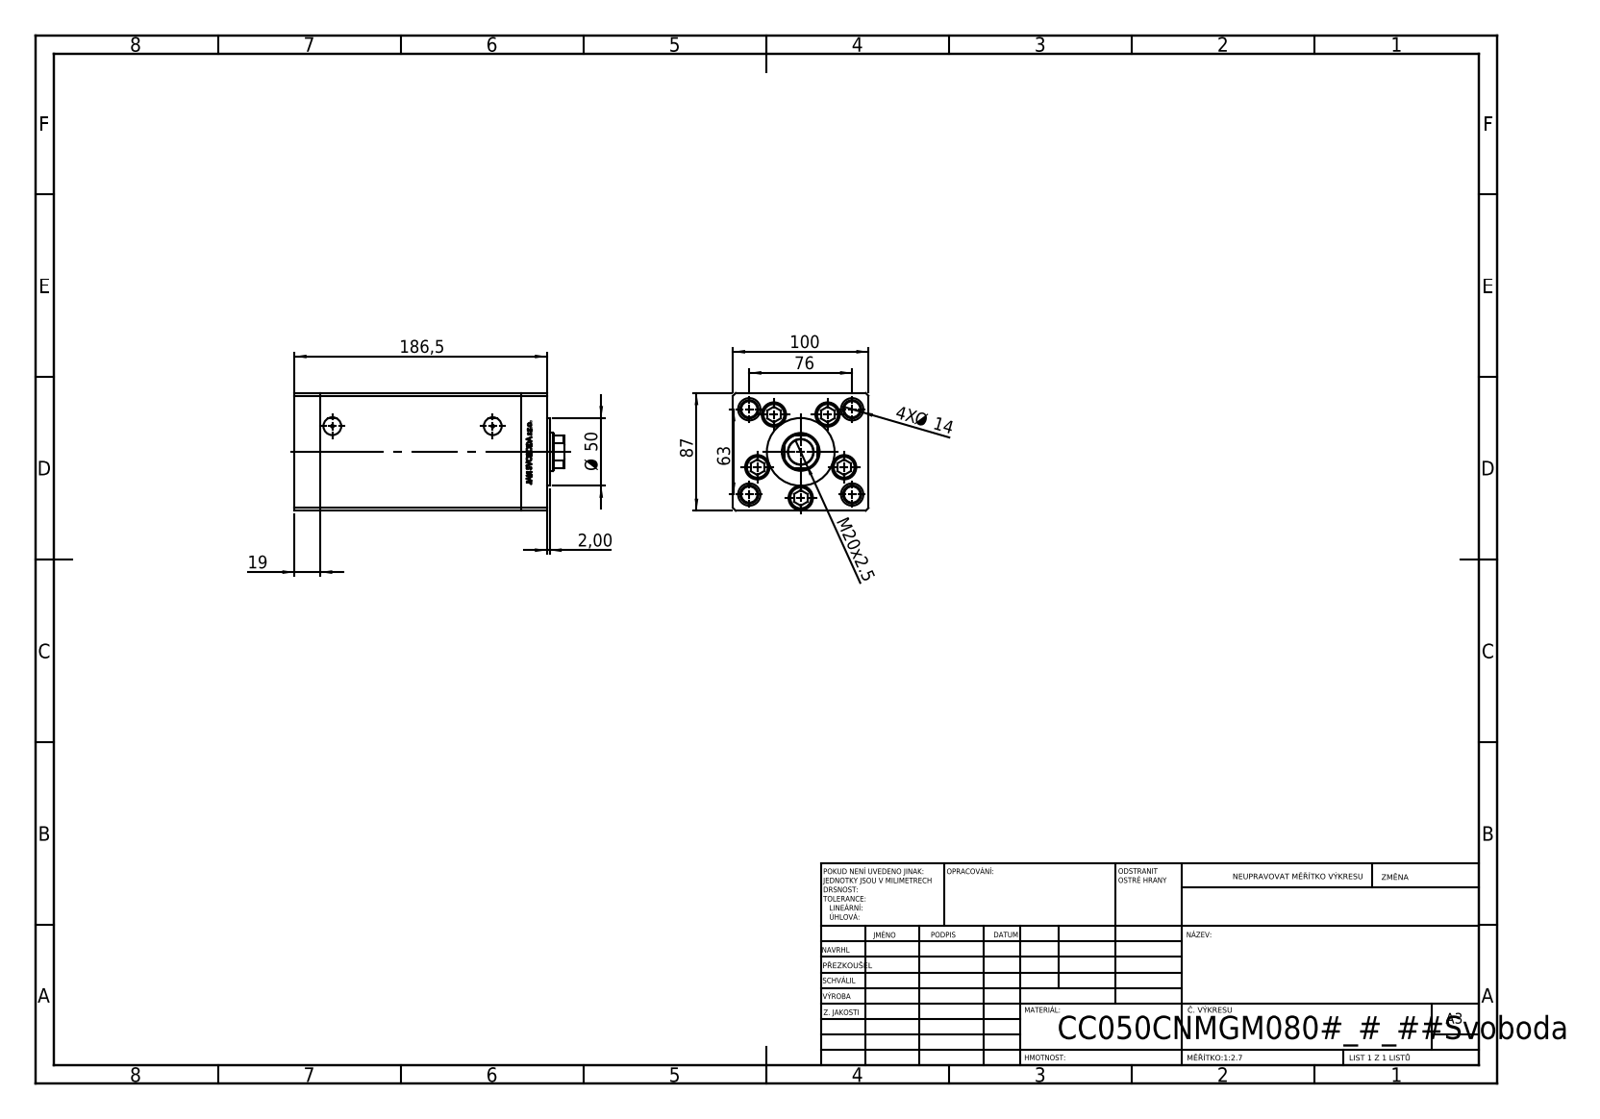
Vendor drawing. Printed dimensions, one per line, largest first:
186,5
100
87
76
63
Ø 50
M20x2.5
19
4X Ø 14
2,00
